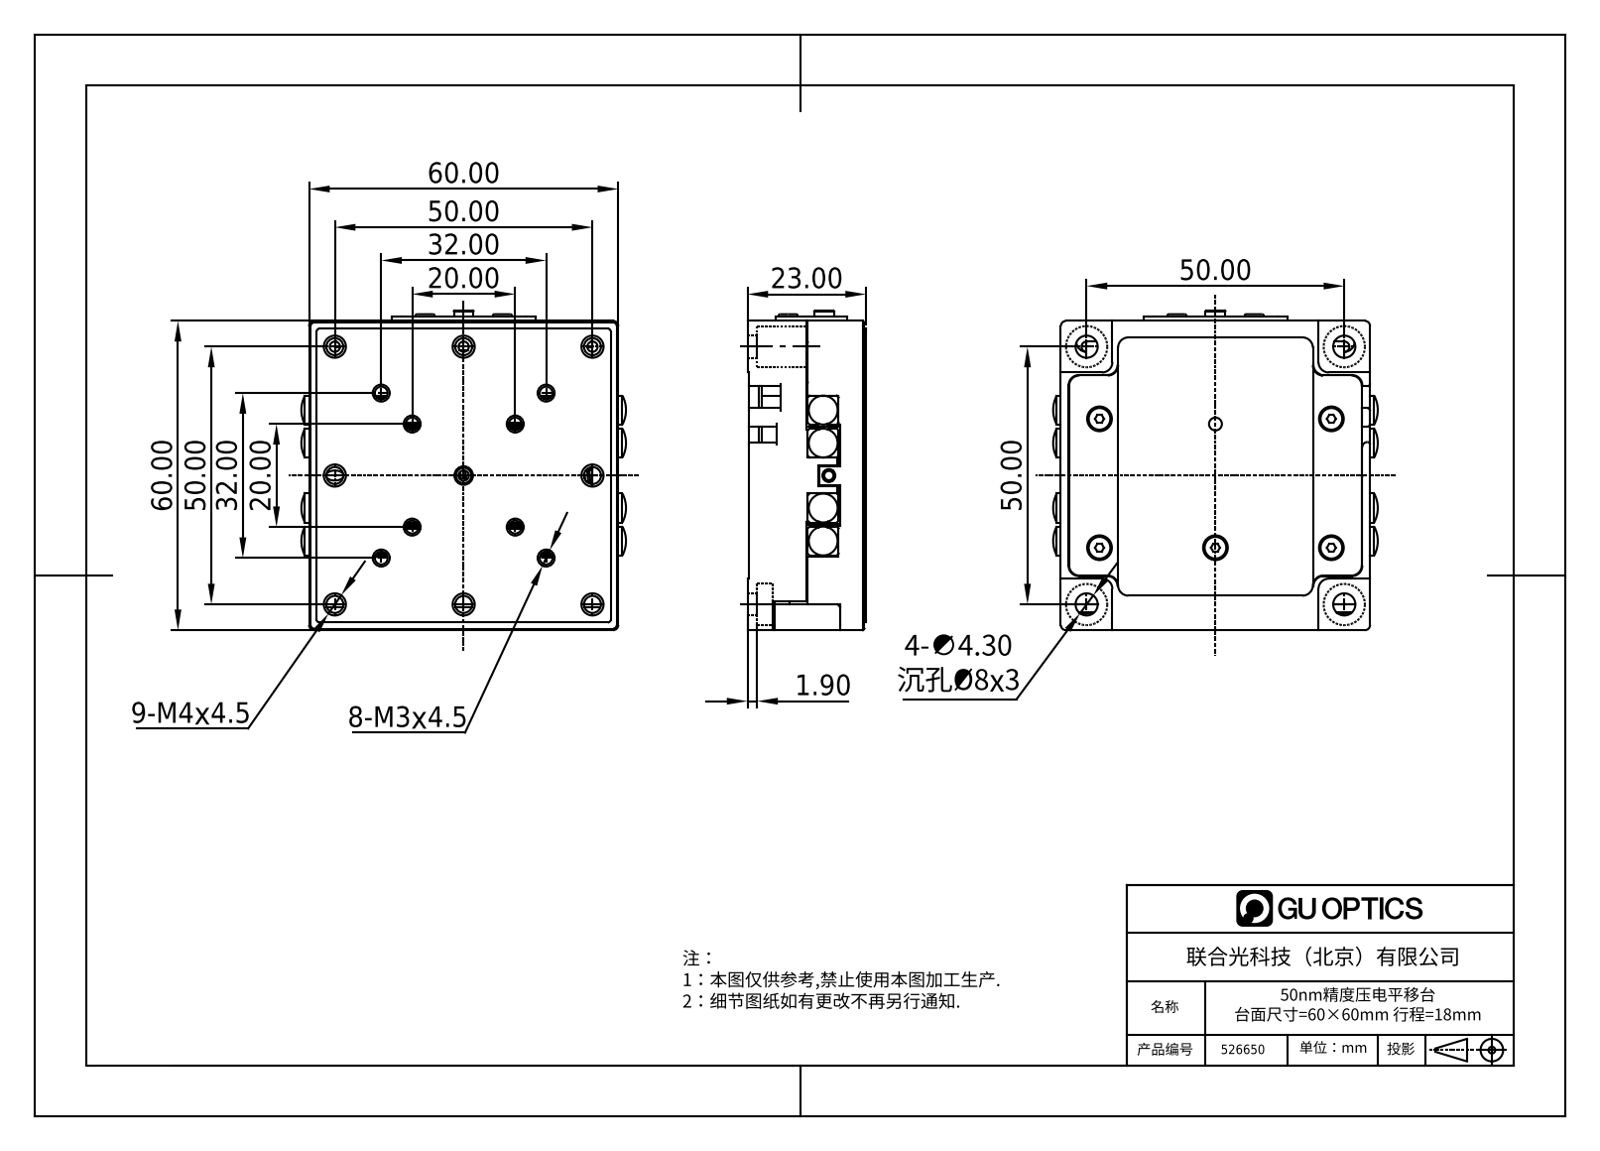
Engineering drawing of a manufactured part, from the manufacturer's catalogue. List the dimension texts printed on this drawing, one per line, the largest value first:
60.00
60.00
50.00
50.00
50.00
50.00
32.00
32.00
23.00
20.00
20.00
4-沉孔Ø8x3
9-M4x4.5
8-M3x4.5
1.90
